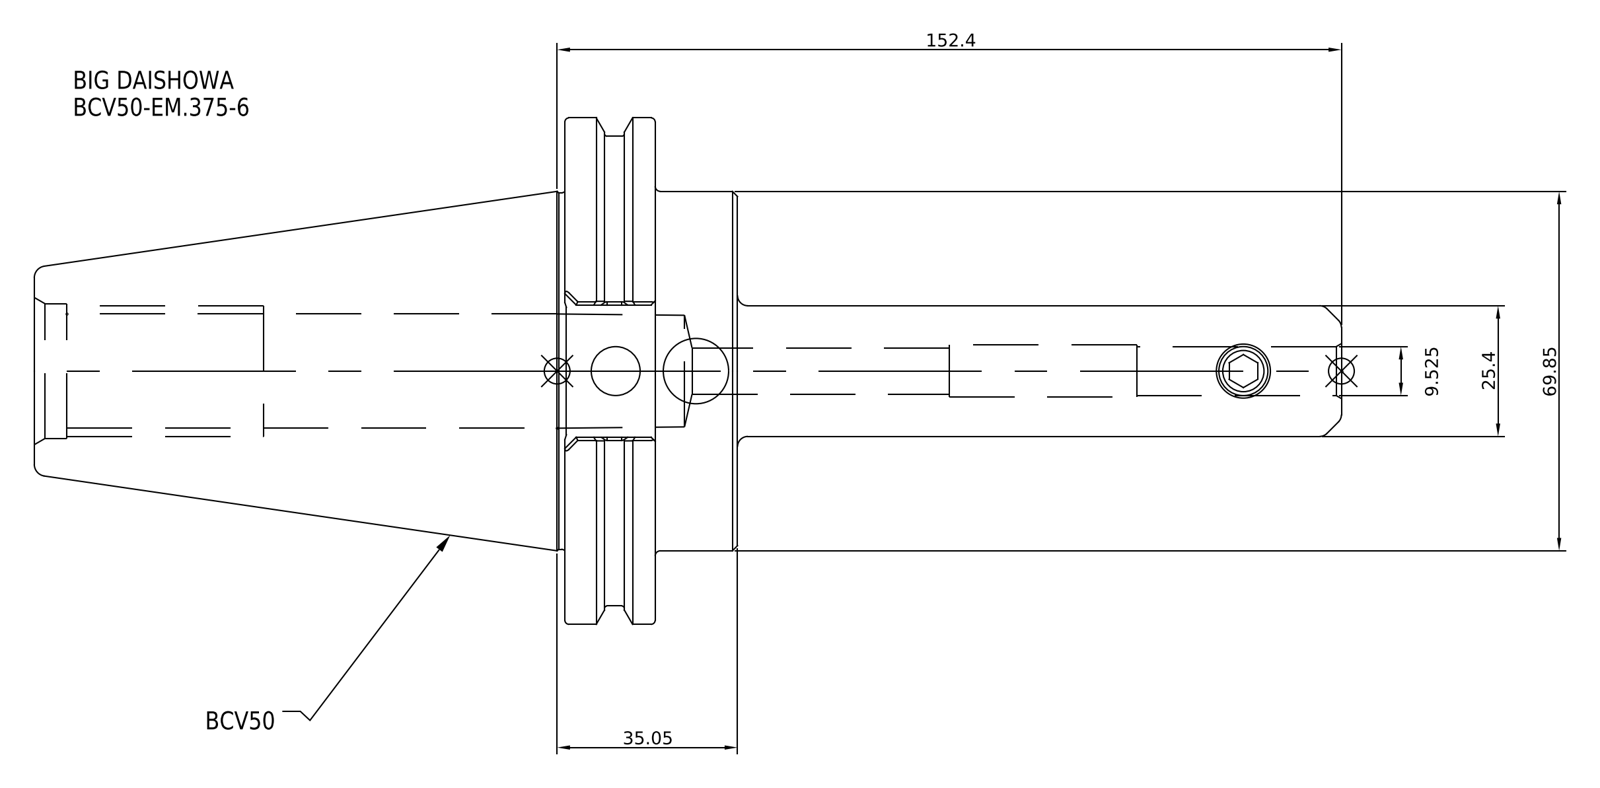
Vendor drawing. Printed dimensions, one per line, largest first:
152.4
69.85
35.05
25.4
9.525
